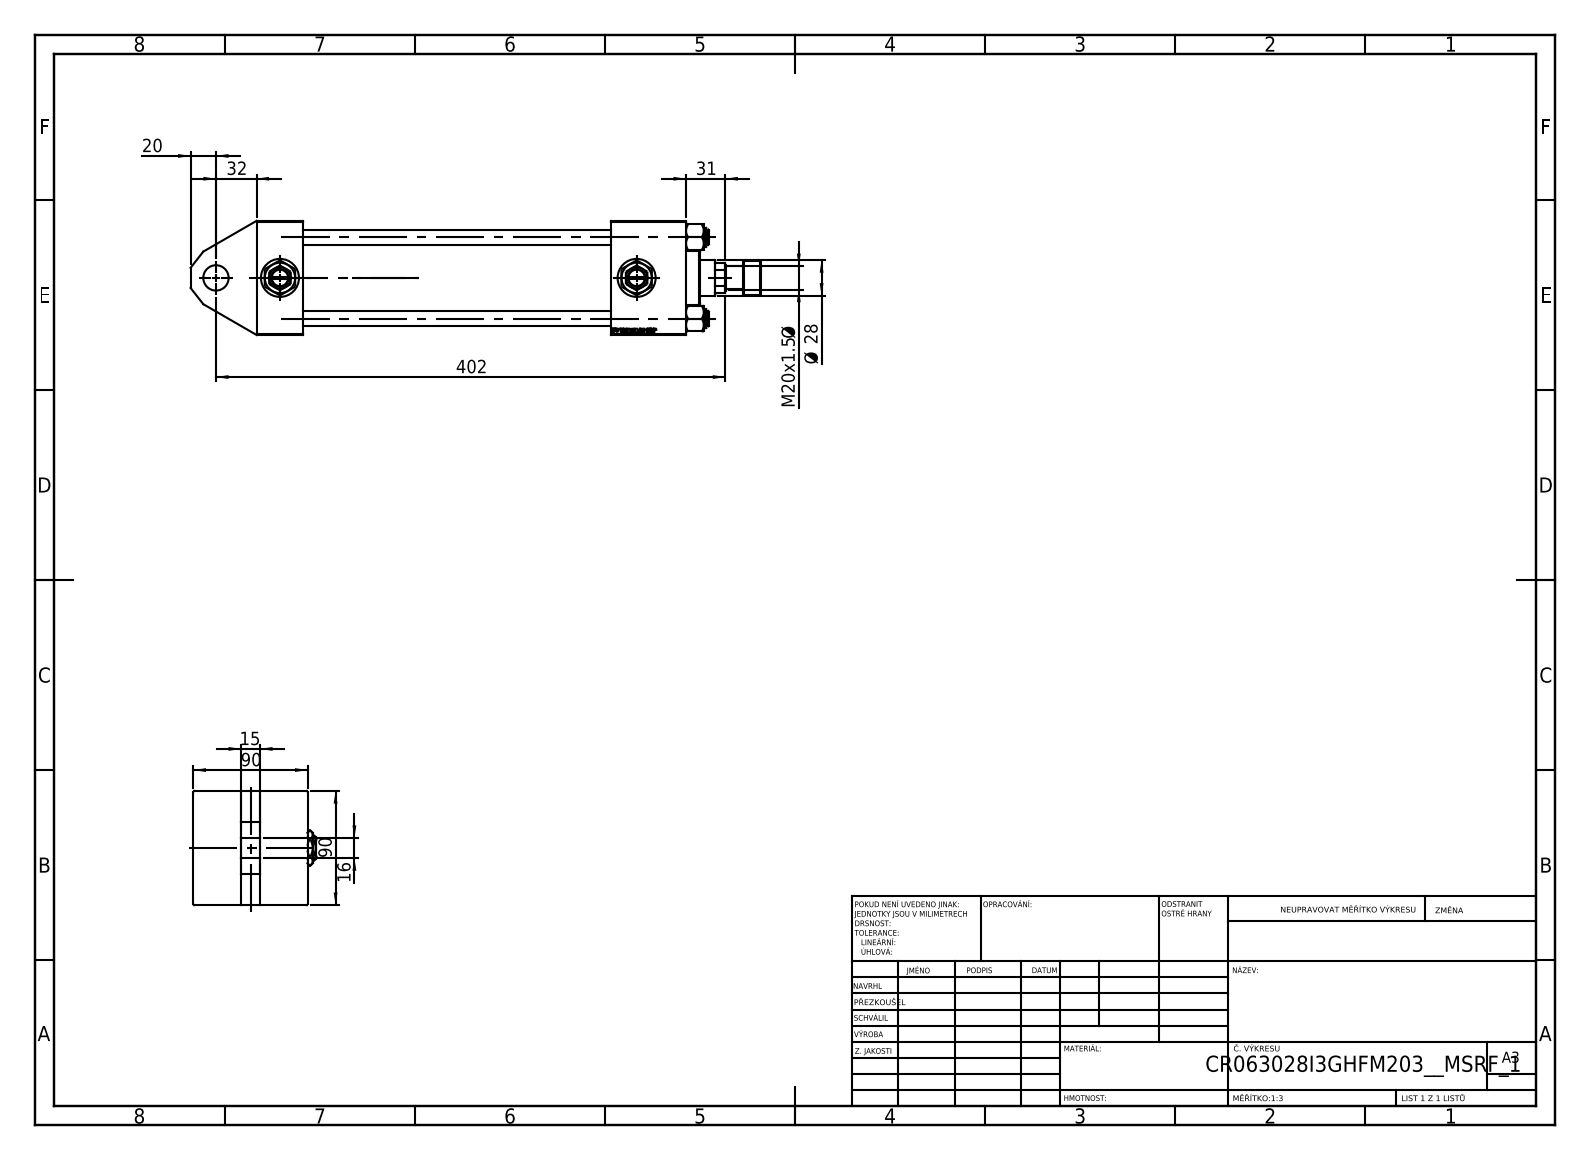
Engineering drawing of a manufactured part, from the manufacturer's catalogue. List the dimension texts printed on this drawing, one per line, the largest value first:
402
90
90
32
31
Ø 28
M20x1.5 Ø
20
16
15
